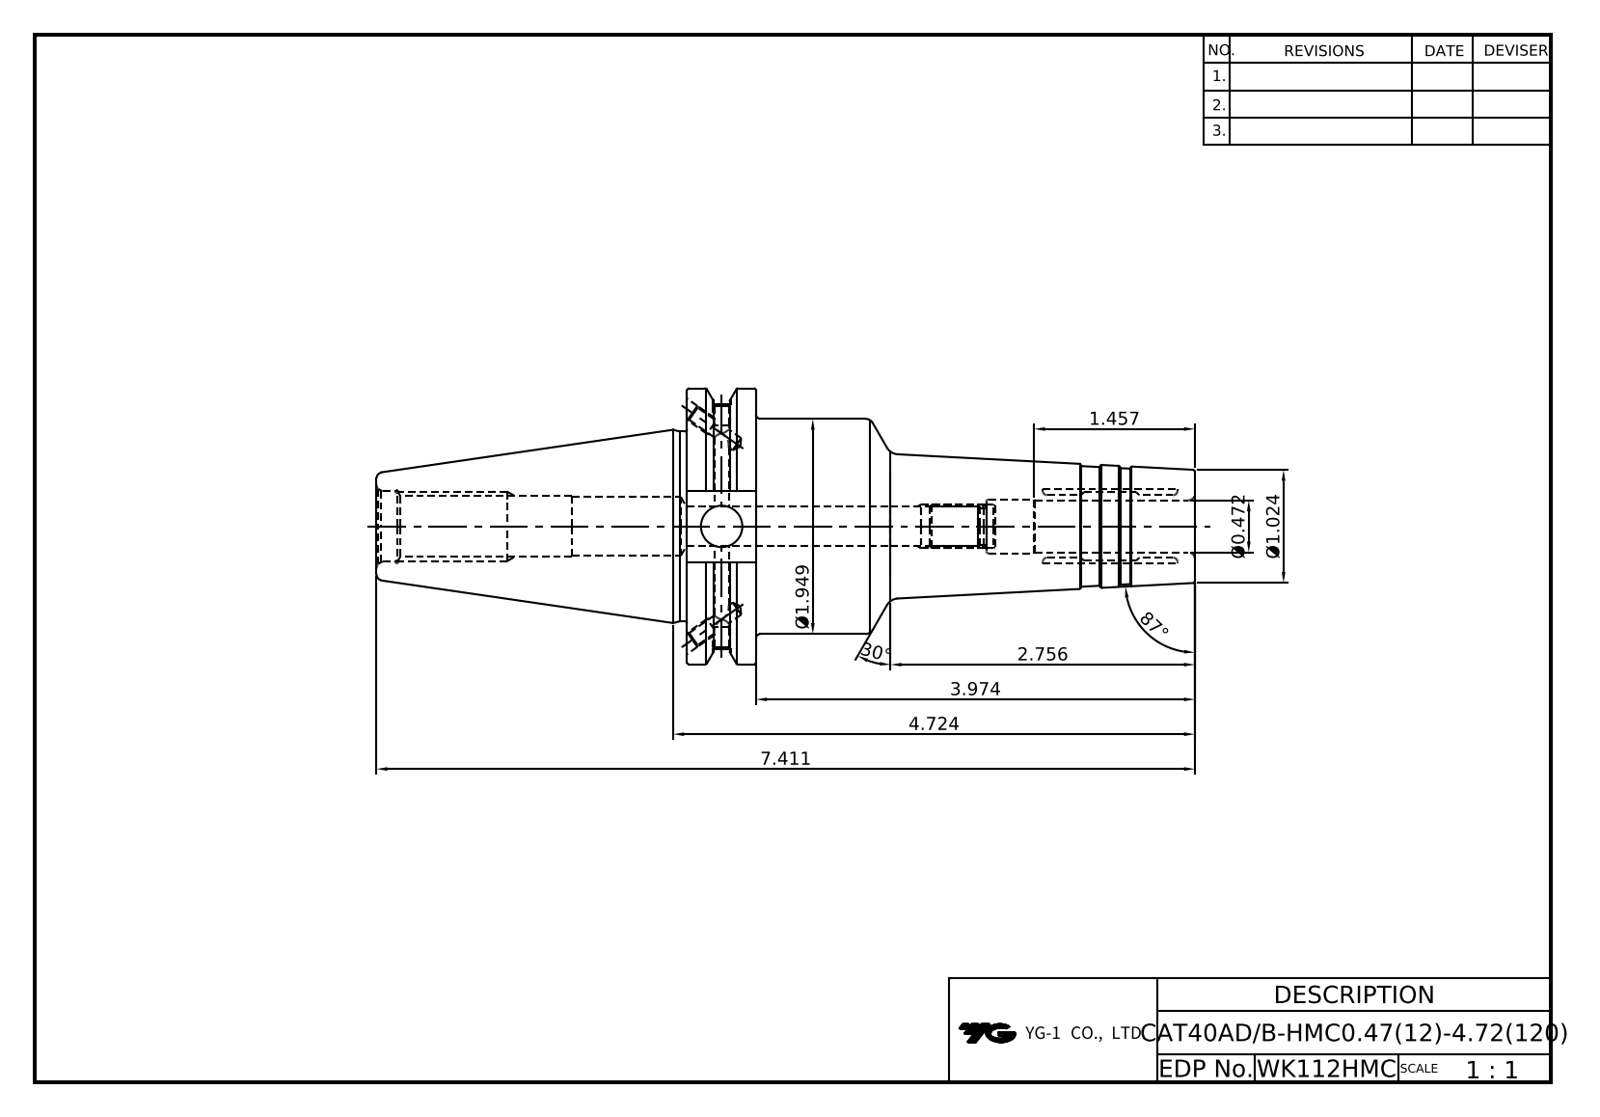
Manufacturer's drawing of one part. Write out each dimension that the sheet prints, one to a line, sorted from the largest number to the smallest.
87°
30°
7.411
4.724
3.974
2.756
Ø1.949
1.457
Ø1.024
Ø0.472
